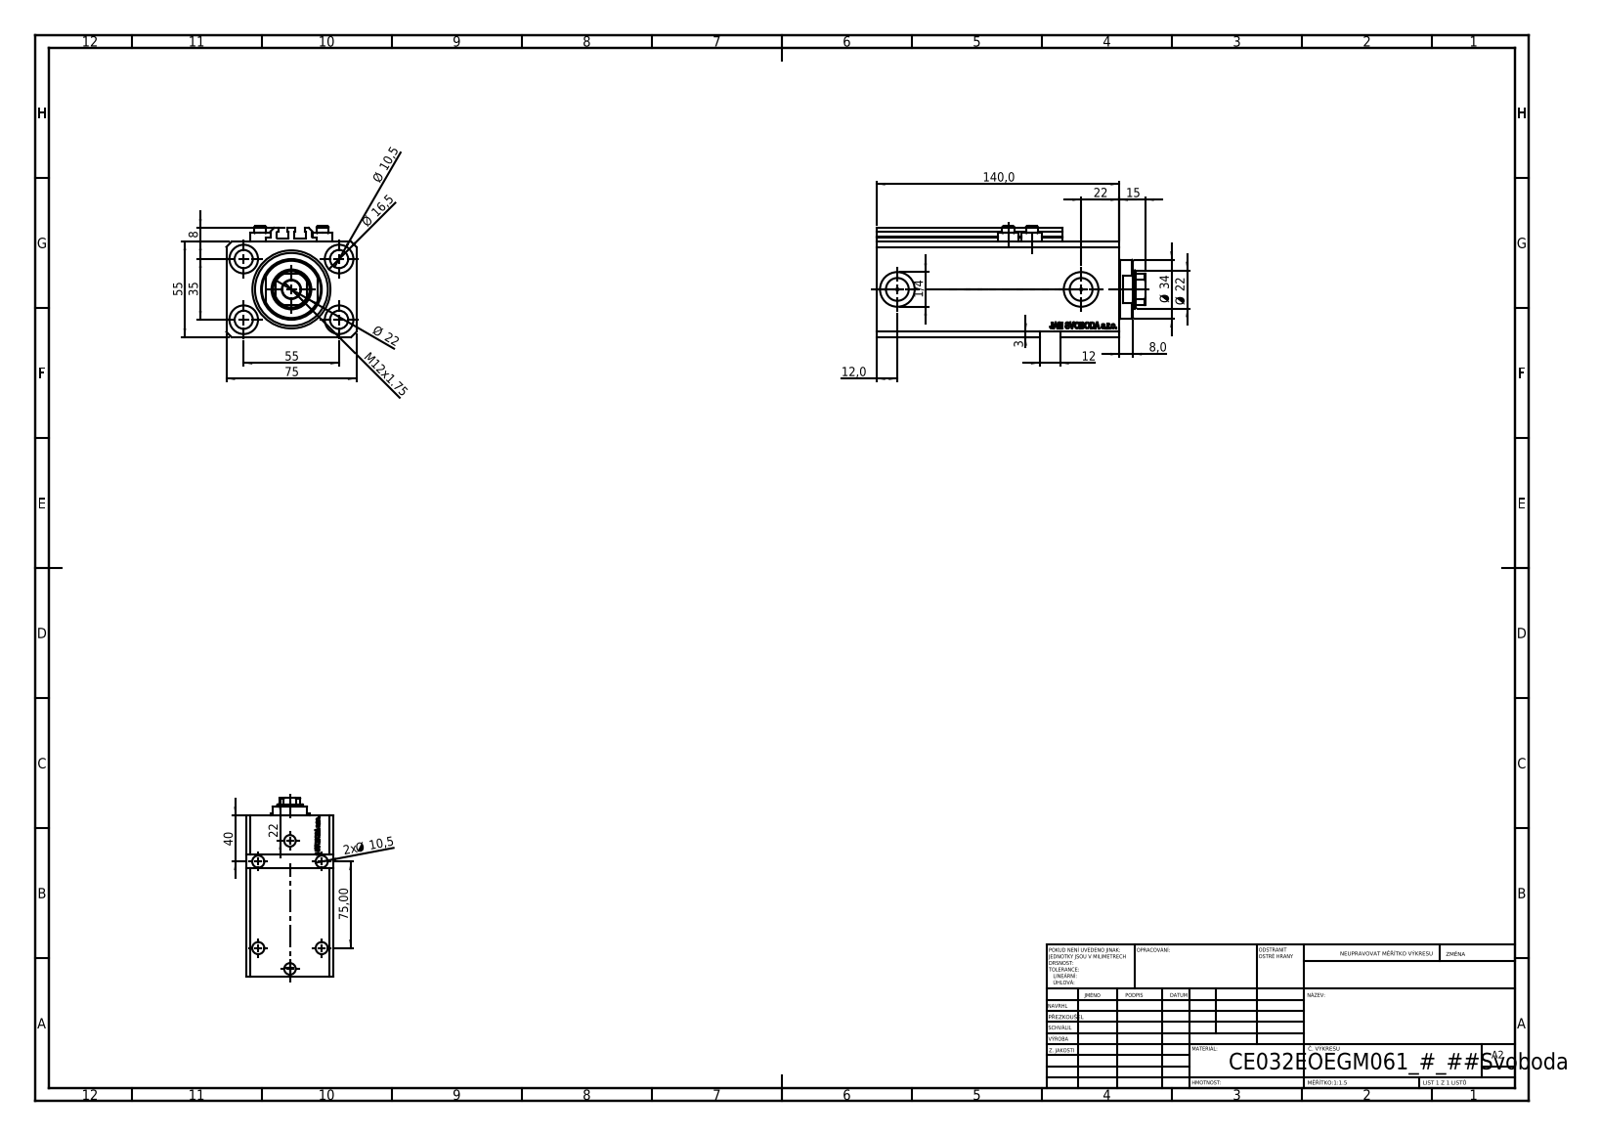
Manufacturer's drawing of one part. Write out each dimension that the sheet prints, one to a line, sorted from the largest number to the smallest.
140,0
75
75,00
55
55
40
35
Ø 34
Ø 22
22
Ø 22
22
Ø 16,5
15
M12x1.75
12,0
12
Ø 10,5
2x Ø 10,5
8
8,0
3
1/4
